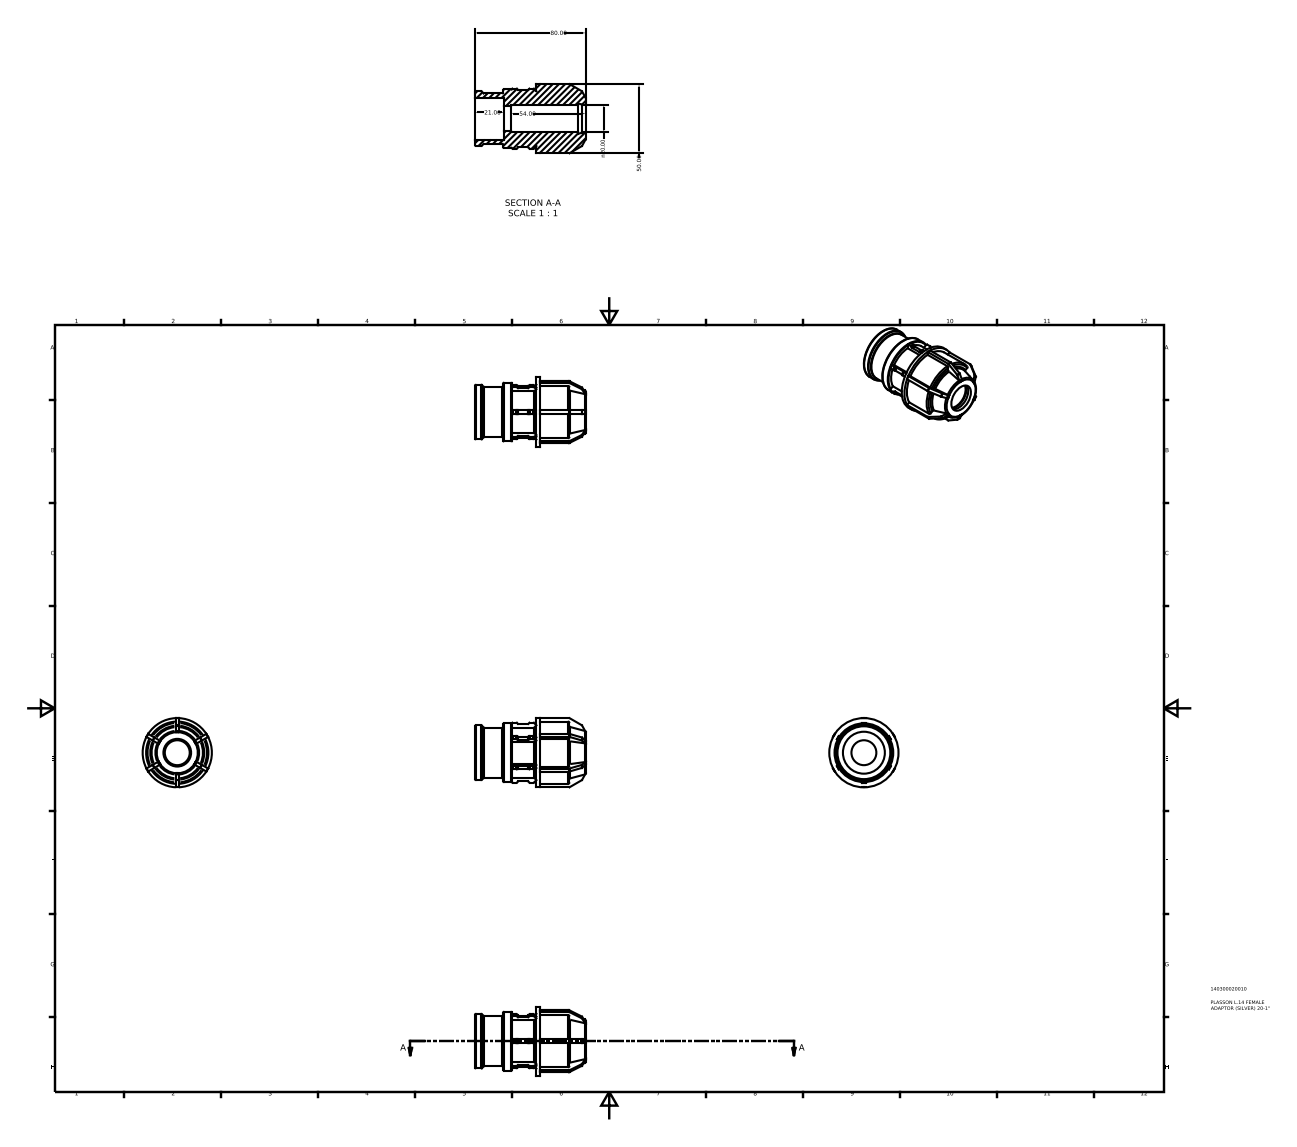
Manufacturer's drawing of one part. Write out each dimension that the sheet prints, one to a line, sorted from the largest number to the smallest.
80.00
54.00
50.00
21.00
n20.00
